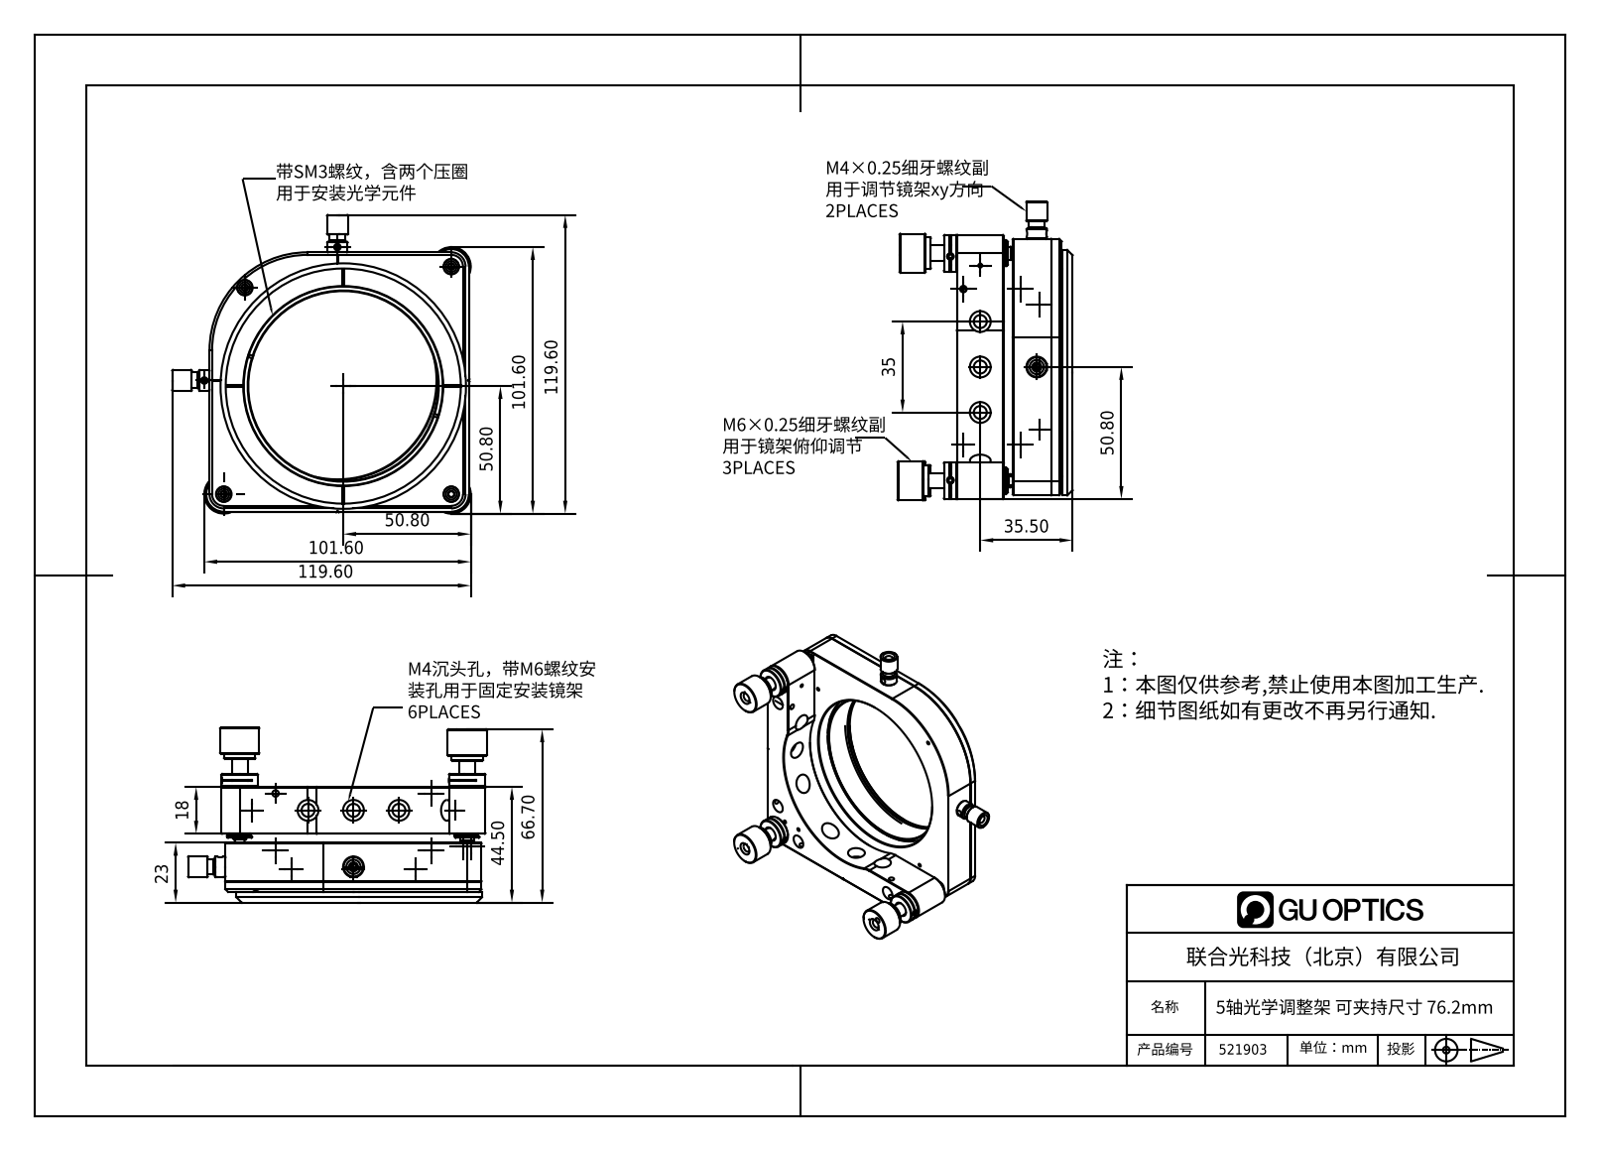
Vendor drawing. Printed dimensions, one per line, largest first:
119.60
119.60
101.60
101.60
66.70
50.80
50.80
50.80
44.50
35.50
35
23
18
